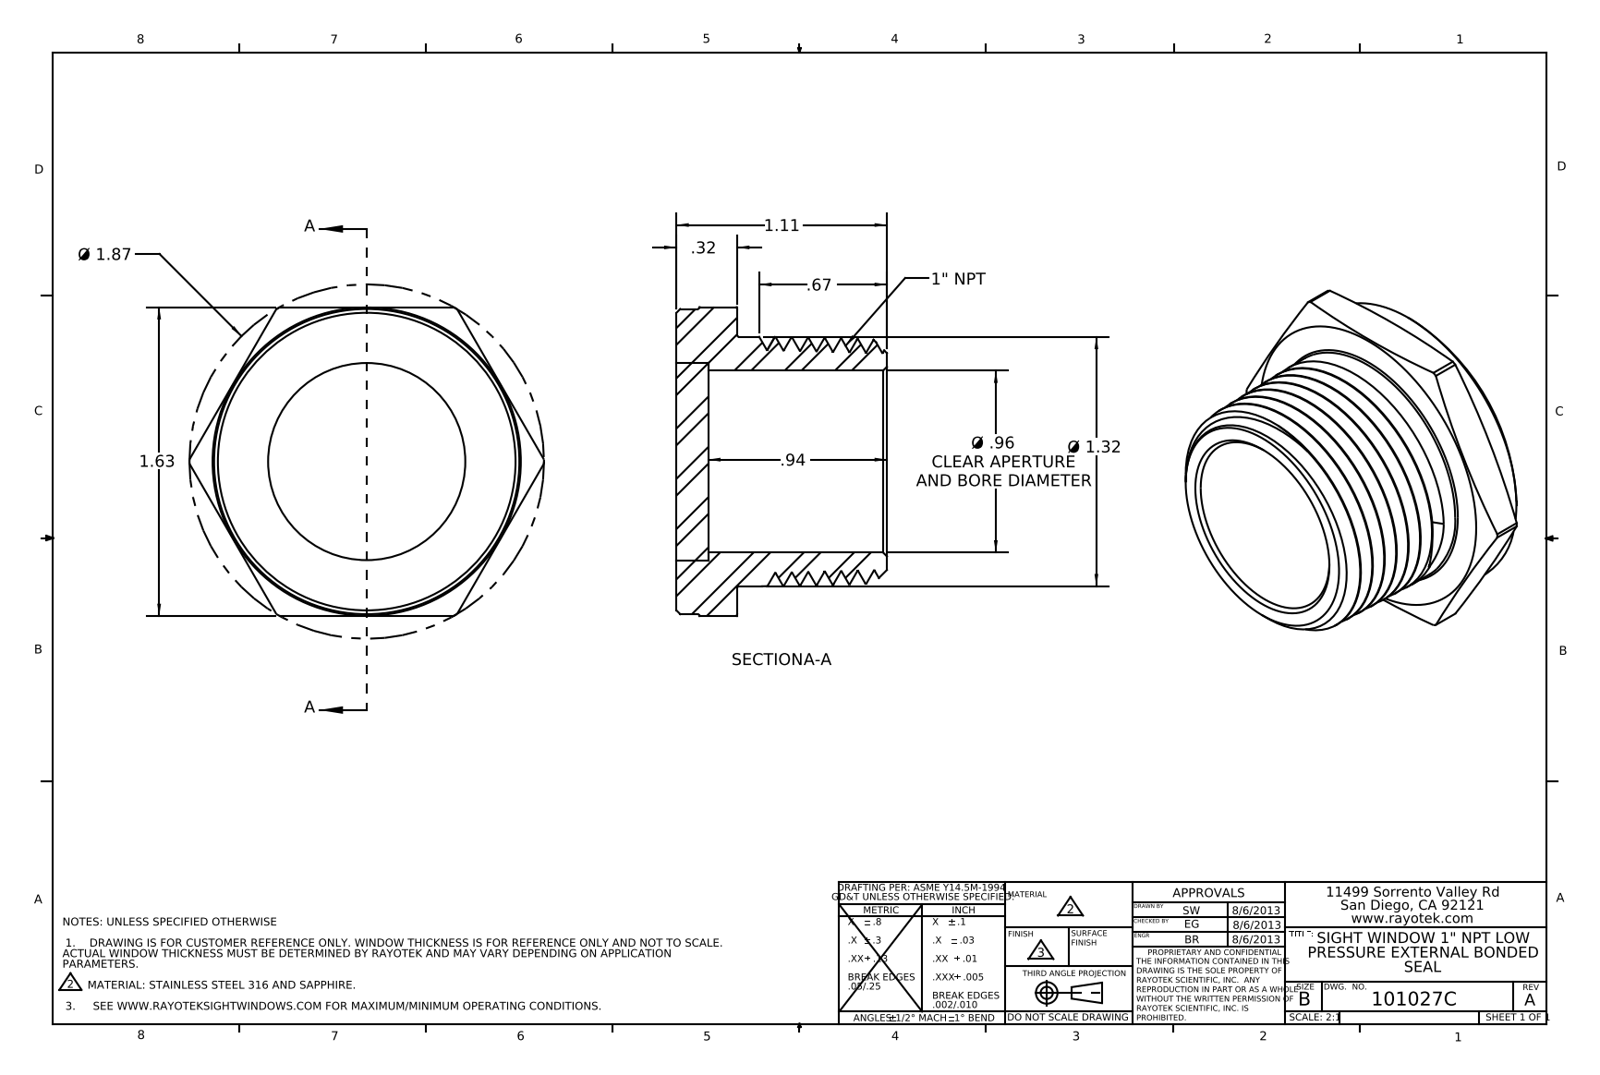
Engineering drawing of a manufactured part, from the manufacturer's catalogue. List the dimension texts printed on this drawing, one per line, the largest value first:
Ø 1.87
1.63
Ø 1.32
1.11
Ø .96 CLEAR APERTURE AND BORE DIAMETER
.94
.67
.32
